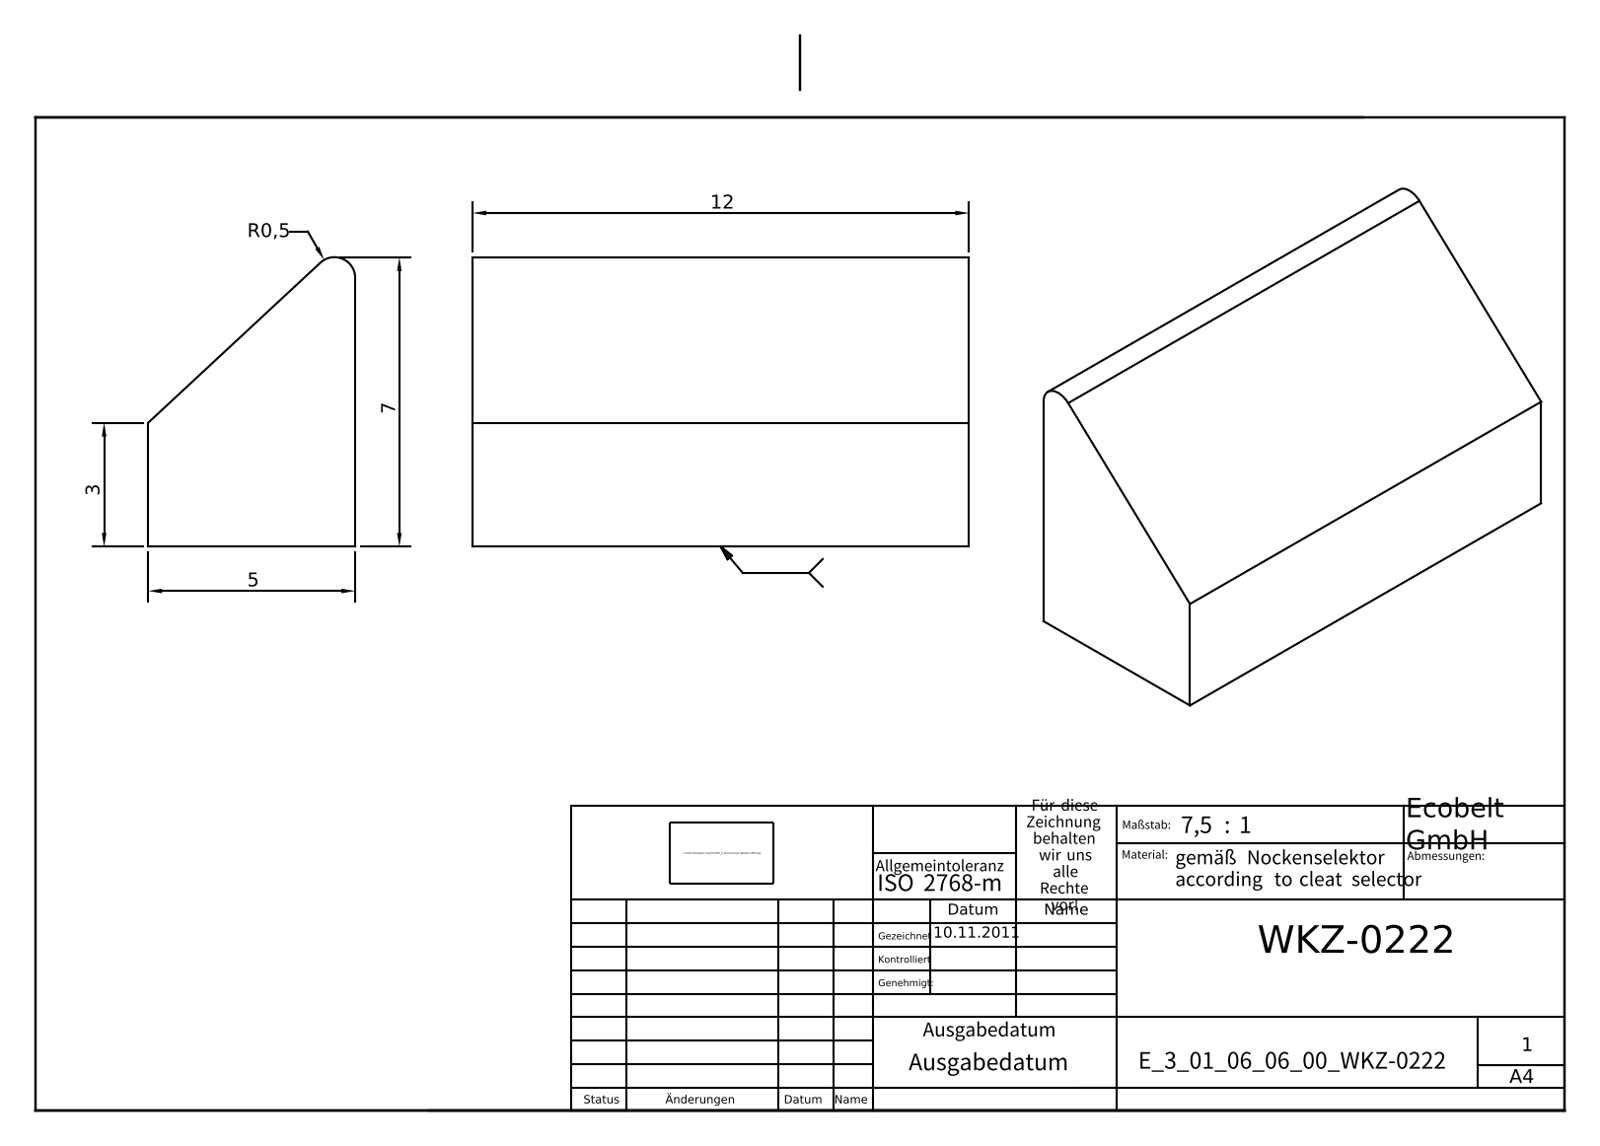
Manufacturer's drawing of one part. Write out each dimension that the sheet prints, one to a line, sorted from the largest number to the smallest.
12
7
5
3
R0,5
